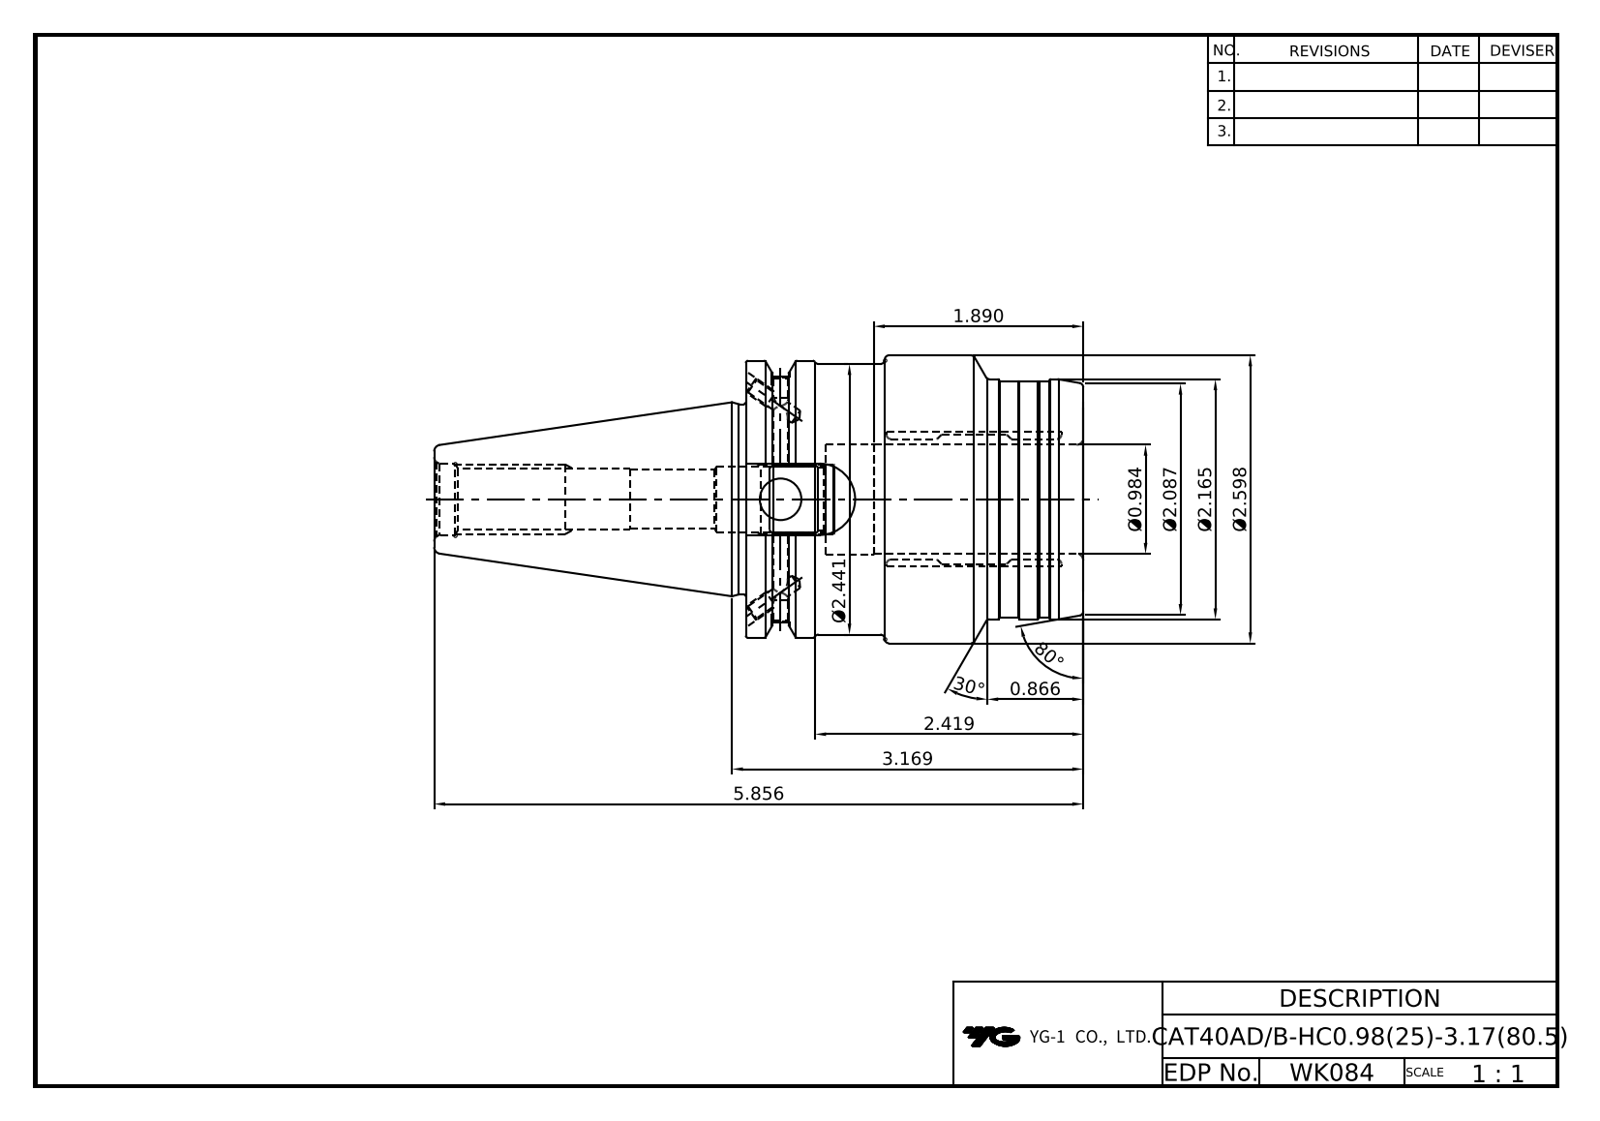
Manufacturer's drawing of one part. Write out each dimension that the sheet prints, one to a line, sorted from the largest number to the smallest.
80°
30°
5.856
3.169
Ø2.598
Ø2.441
2.419
Ø2.165
Ø2.087
1.890
Ø0.984
0.866
